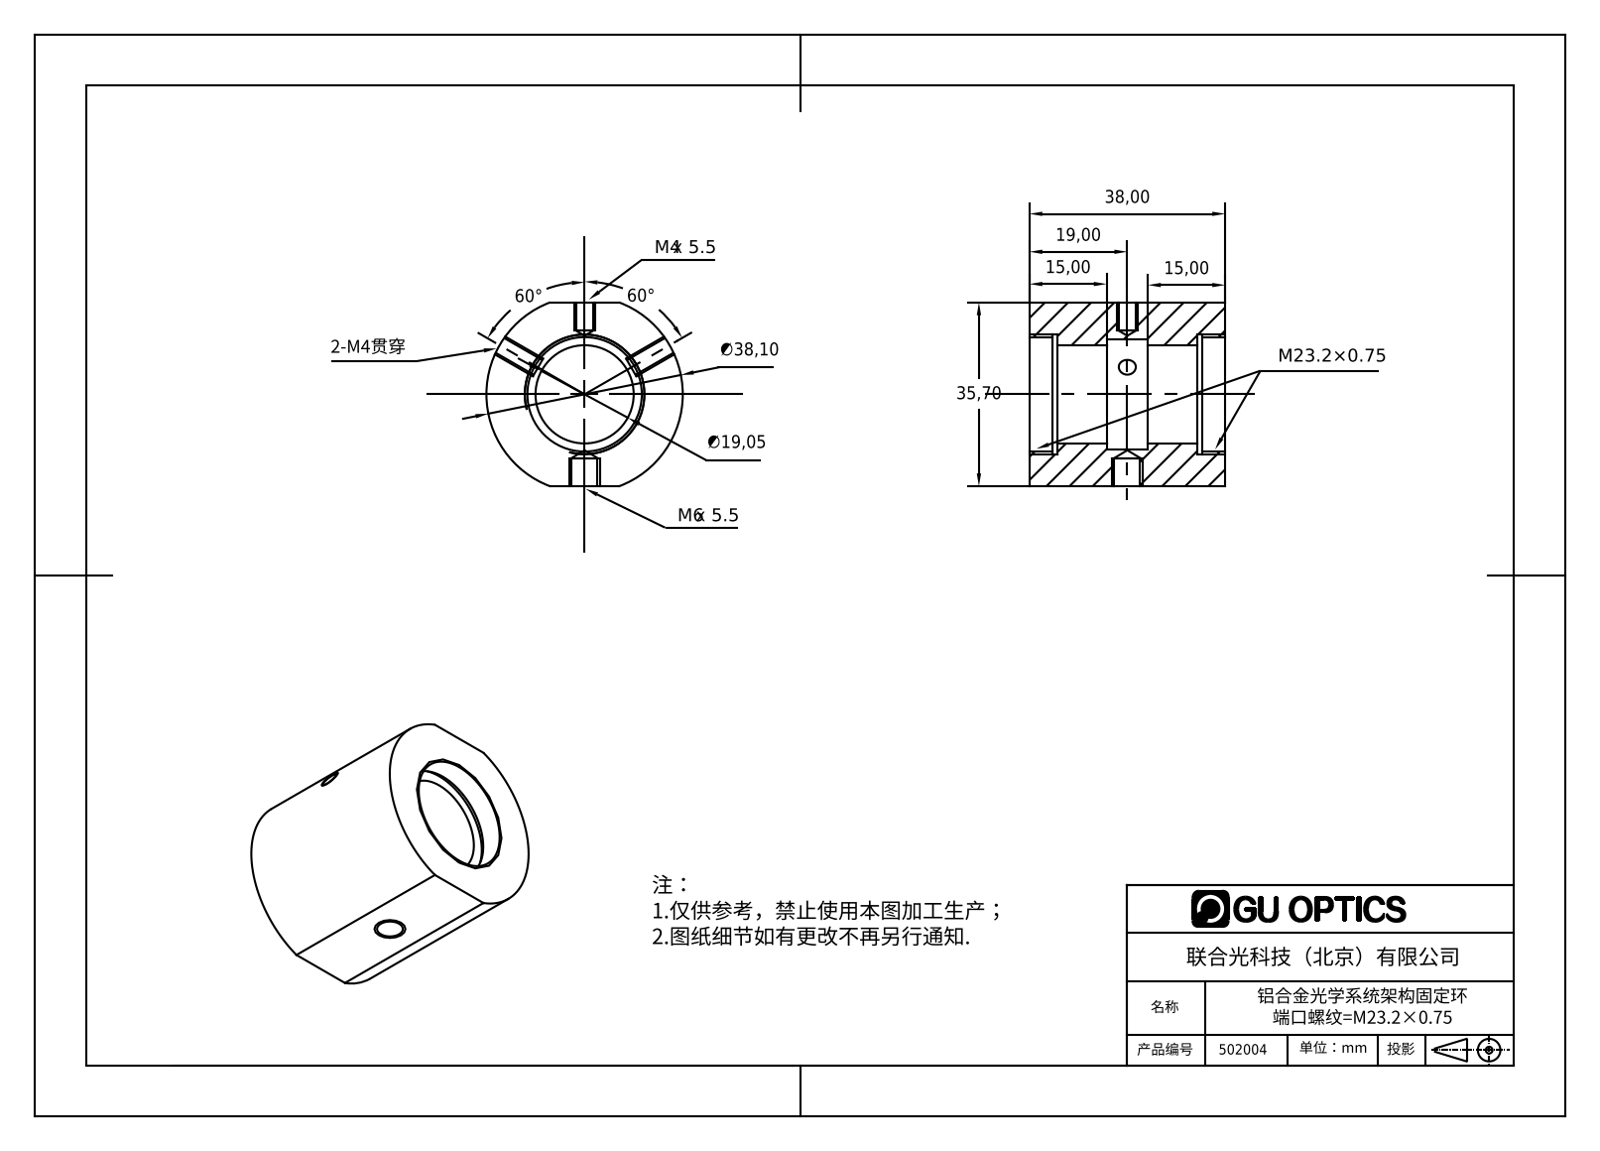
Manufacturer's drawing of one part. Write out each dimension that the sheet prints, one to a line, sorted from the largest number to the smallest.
60°
60°
∅38,10
38,00
35,70
∅19,05
19,00
15,00
15,00
